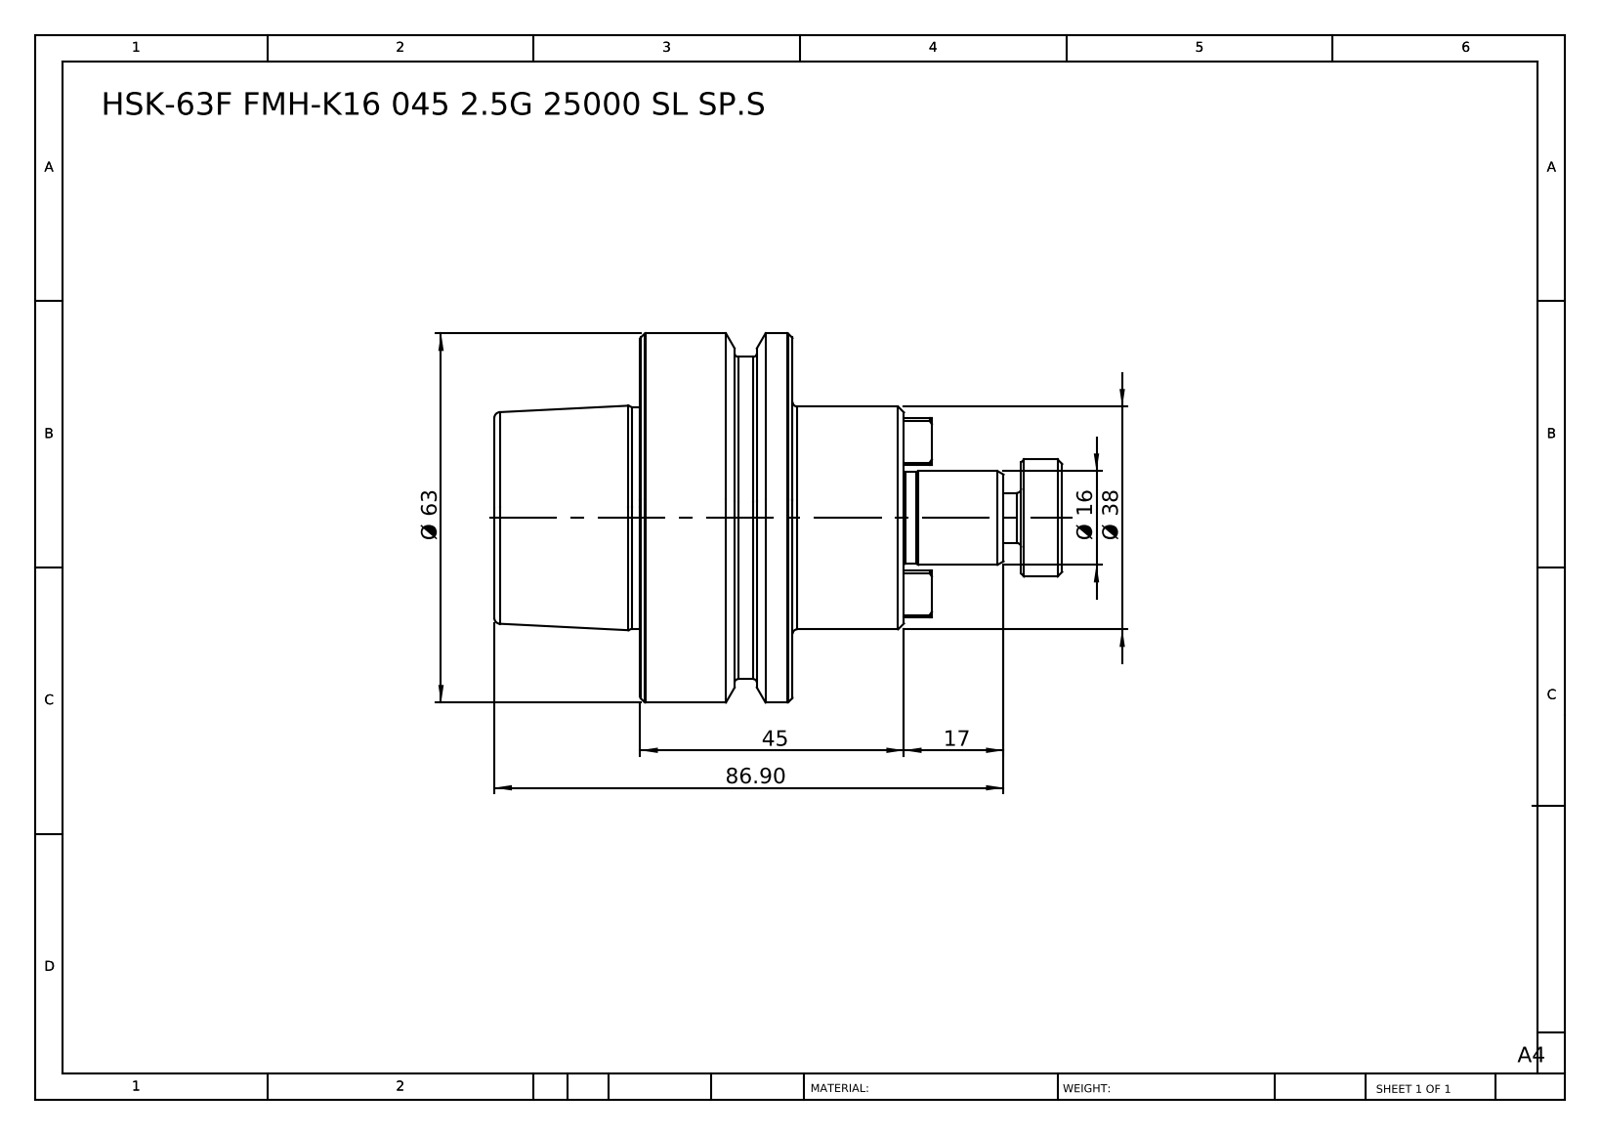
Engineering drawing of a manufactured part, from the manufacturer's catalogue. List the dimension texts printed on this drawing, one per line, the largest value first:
86.90
Ø 63
45
Ø 38
17
Ø 16
